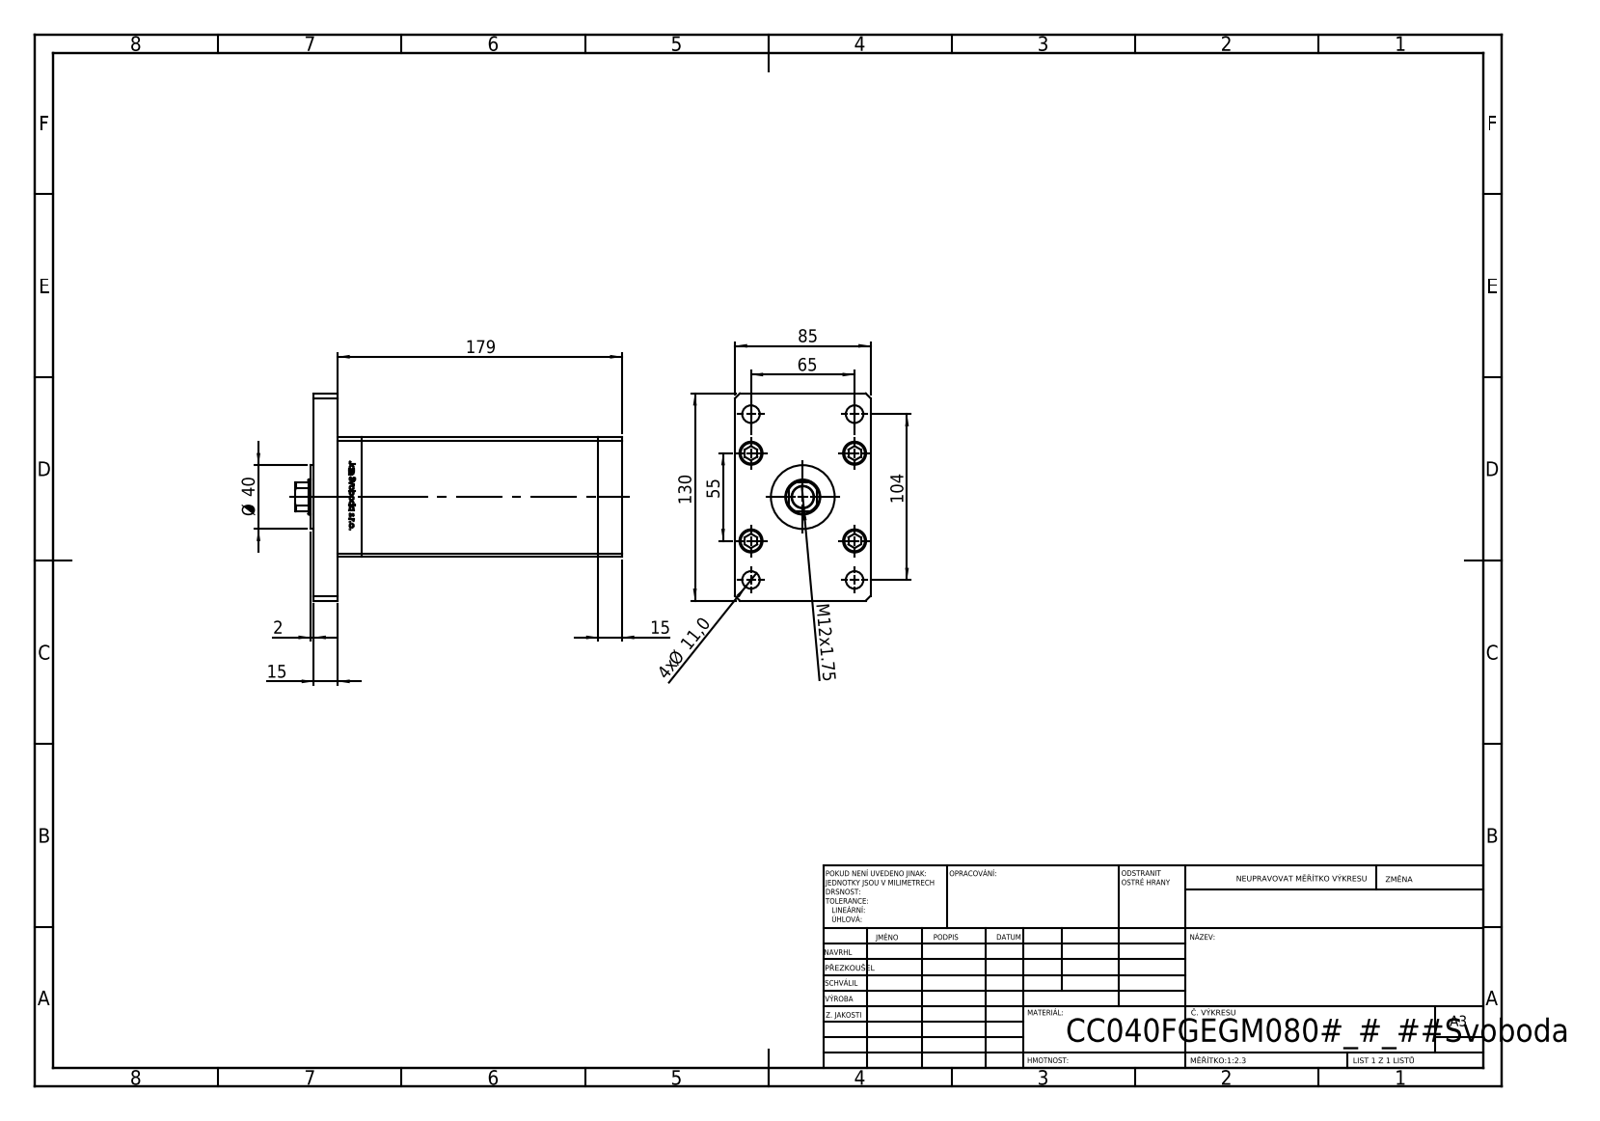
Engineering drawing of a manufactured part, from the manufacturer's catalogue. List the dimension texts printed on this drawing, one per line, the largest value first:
179
130
104
85
65
55
Ø 40
15
15
M12x1.75
4x Ø 11,0
2
